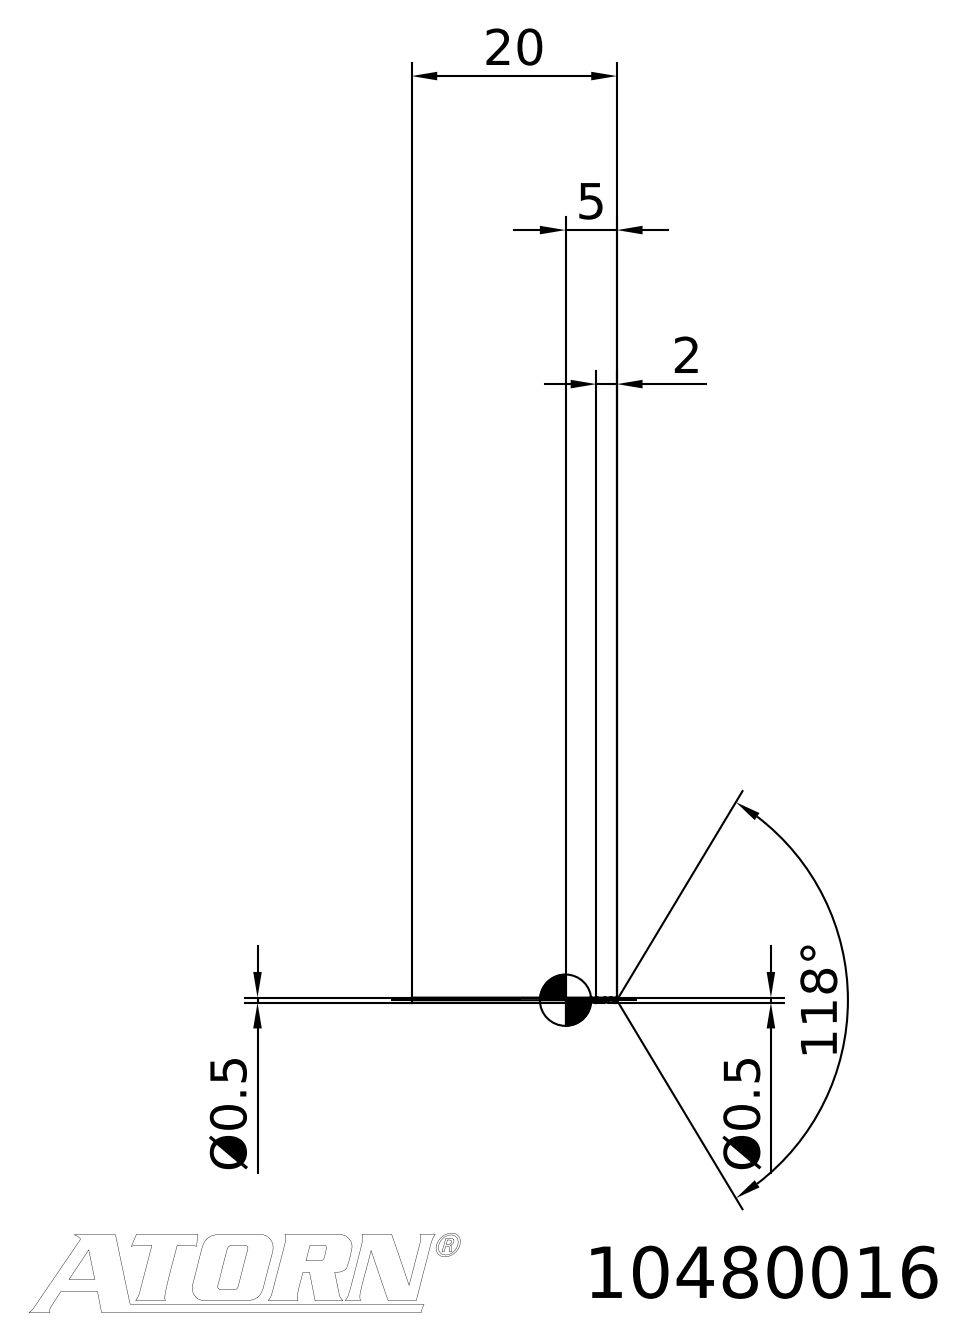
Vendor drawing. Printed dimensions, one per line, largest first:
118°
20
5
2
Ø0.5
Ø0.5
